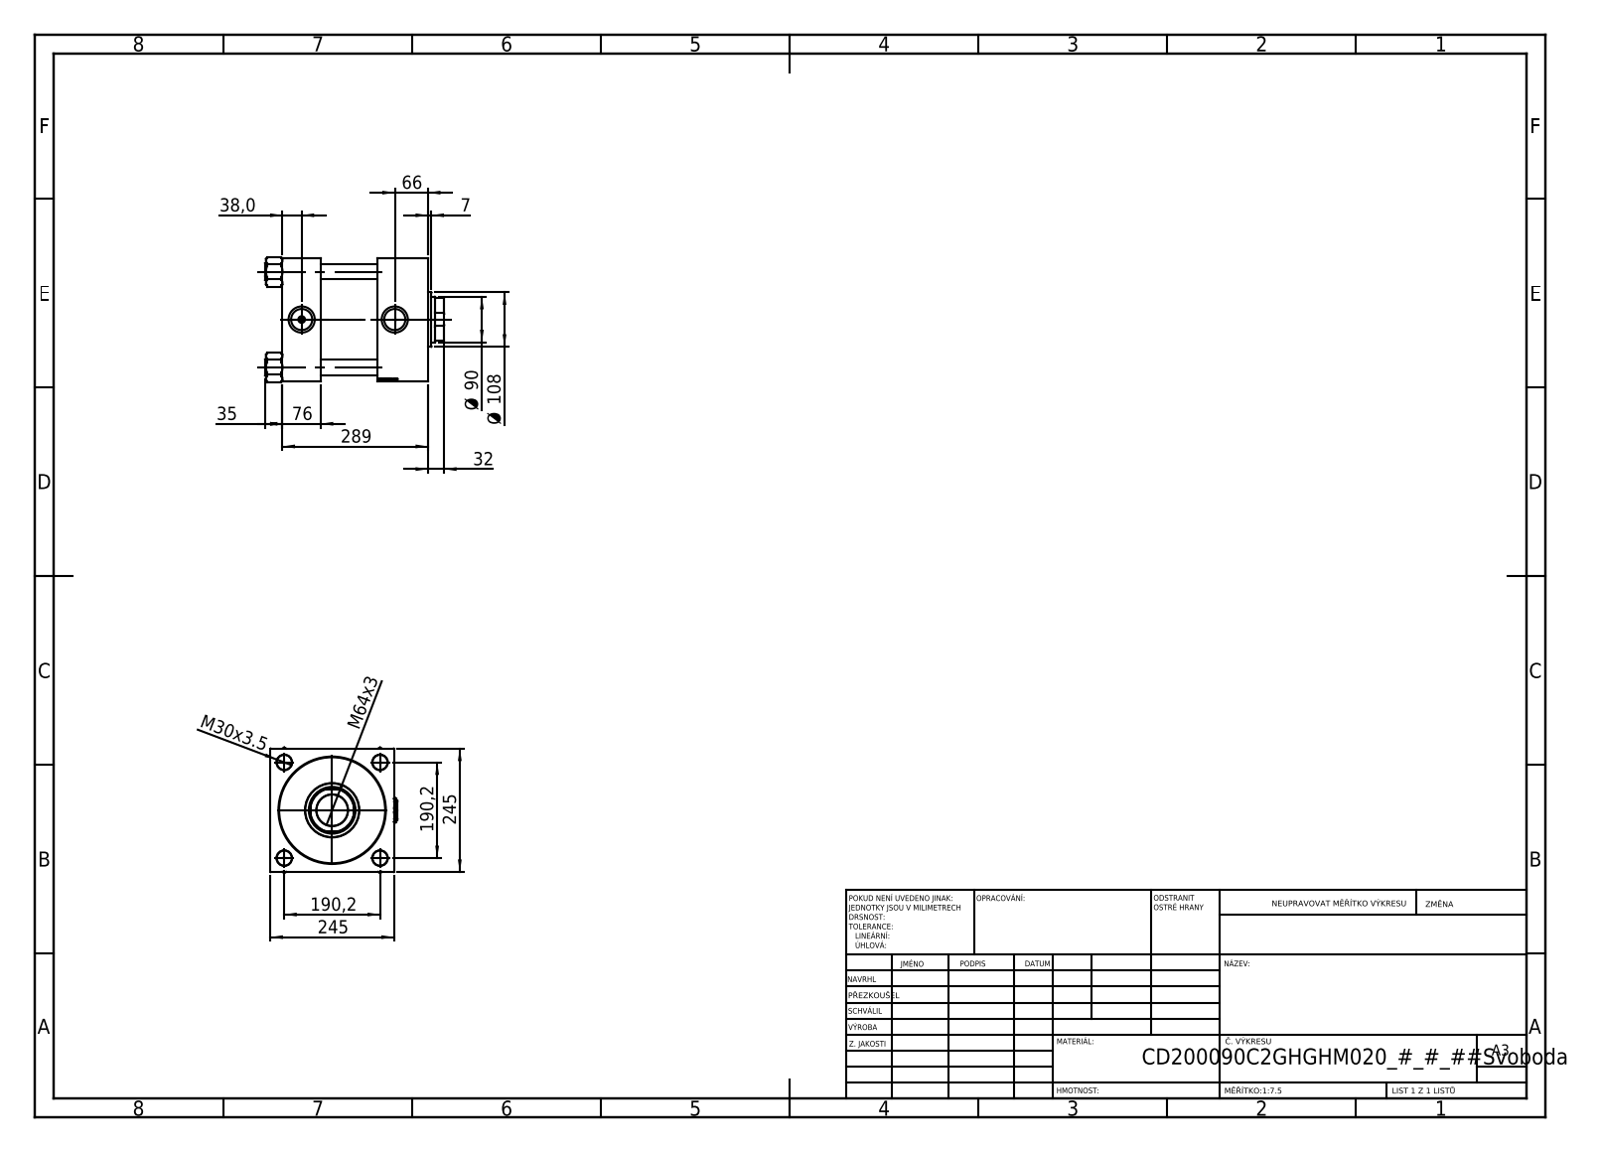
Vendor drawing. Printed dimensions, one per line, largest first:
289
245
245
190,2
190,2
Ø 108
Ø 90
76
66
M64x3
38,0
35
32
M30x3.5
7
